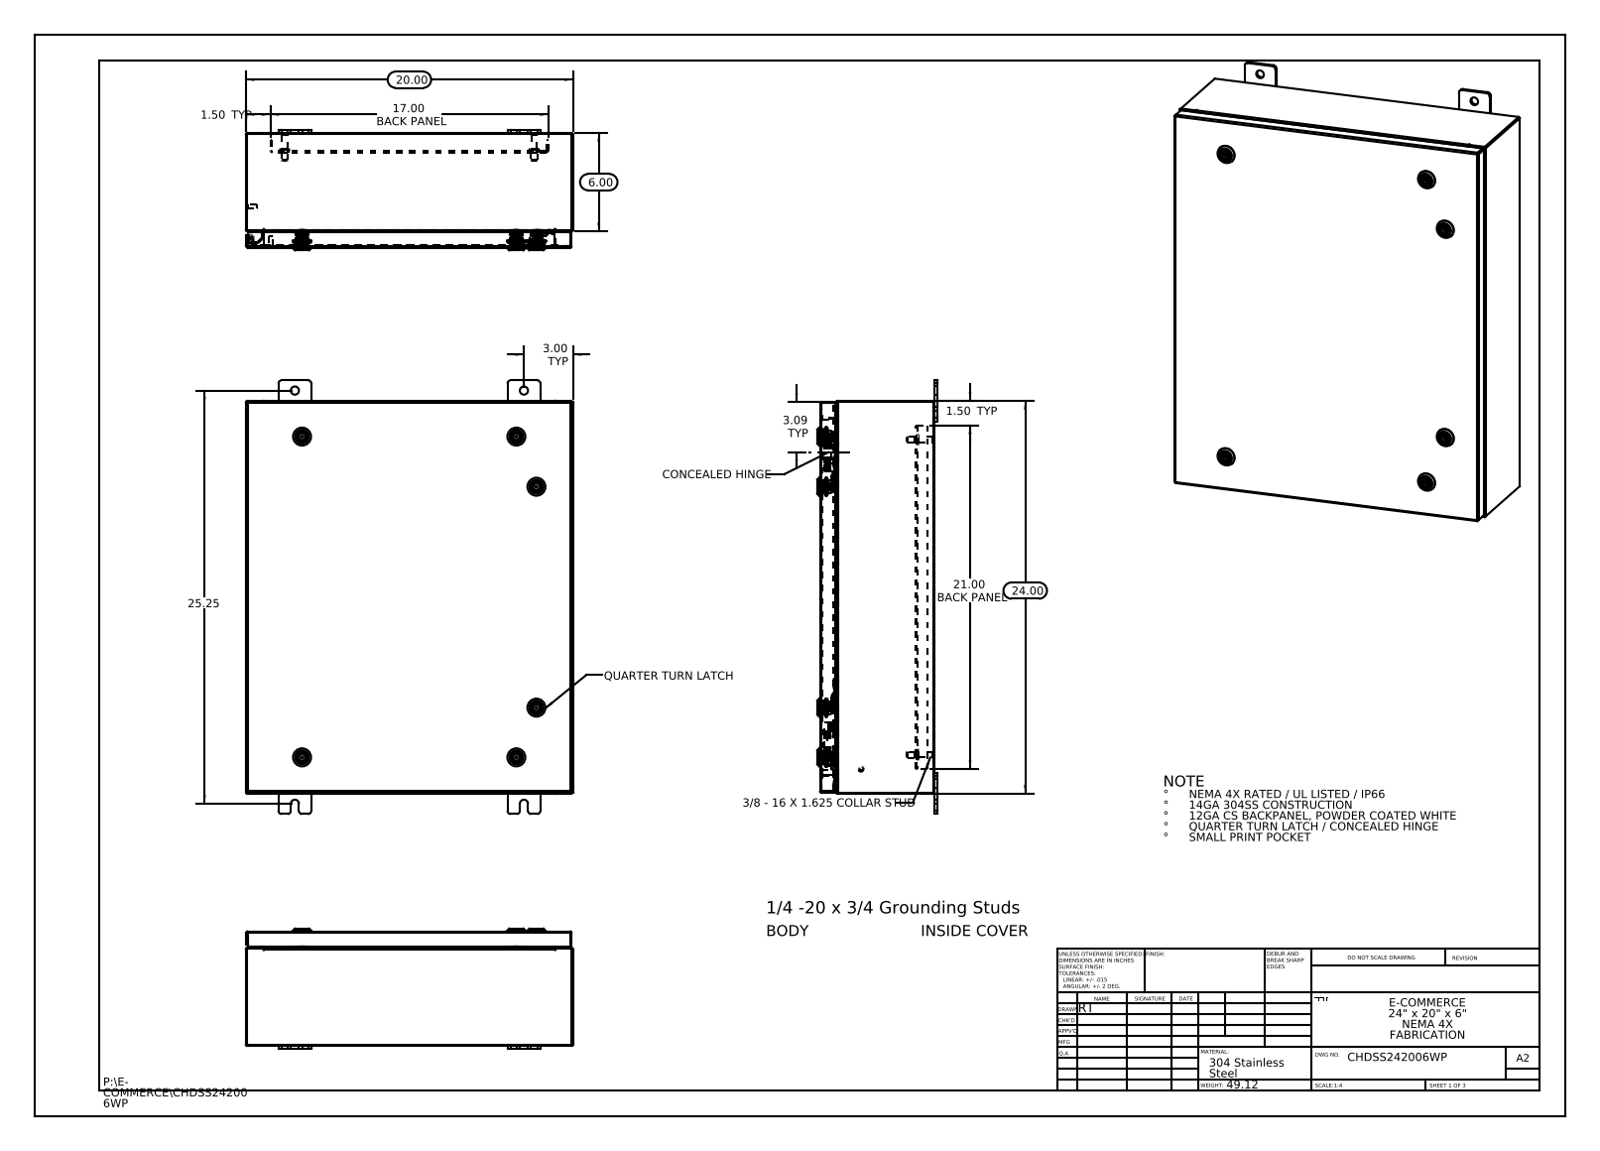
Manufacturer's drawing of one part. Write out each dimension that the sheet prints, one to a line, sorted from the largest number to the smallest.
25.25
24.00
21.00 BACK PANEL
20.00
17.00 BACK PANEL
6.00
3.09 TYP
3.00 TYP
1.50 TYP
1.50 TYP
